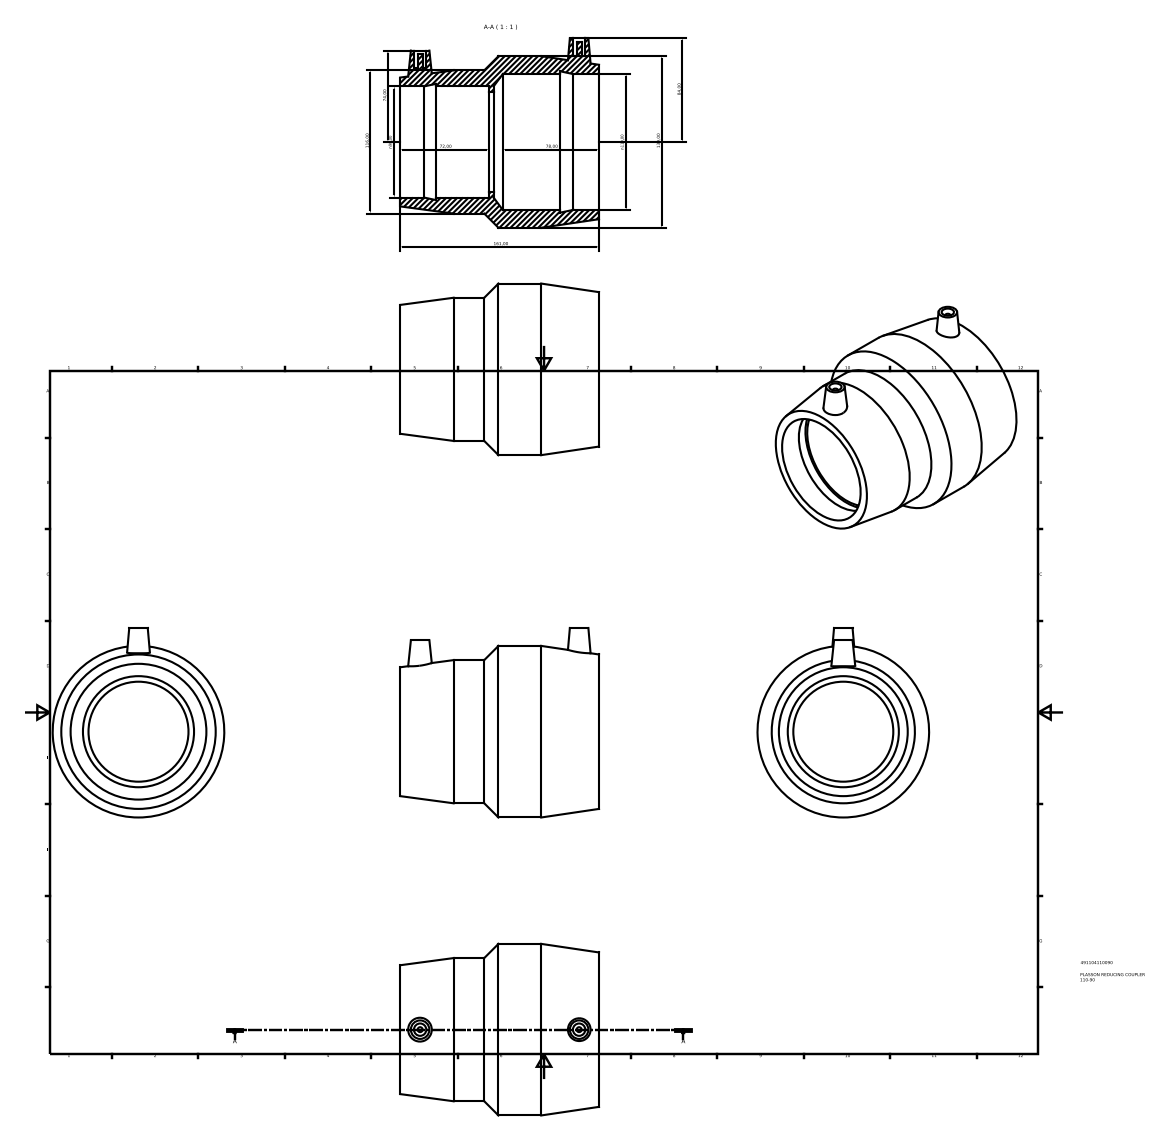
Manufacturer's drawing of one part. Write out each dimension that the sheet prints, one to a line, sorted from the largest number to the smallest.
161,00
139,00
116,00
n110,00
n90,00
84,00
78,00
74,00
72,00
